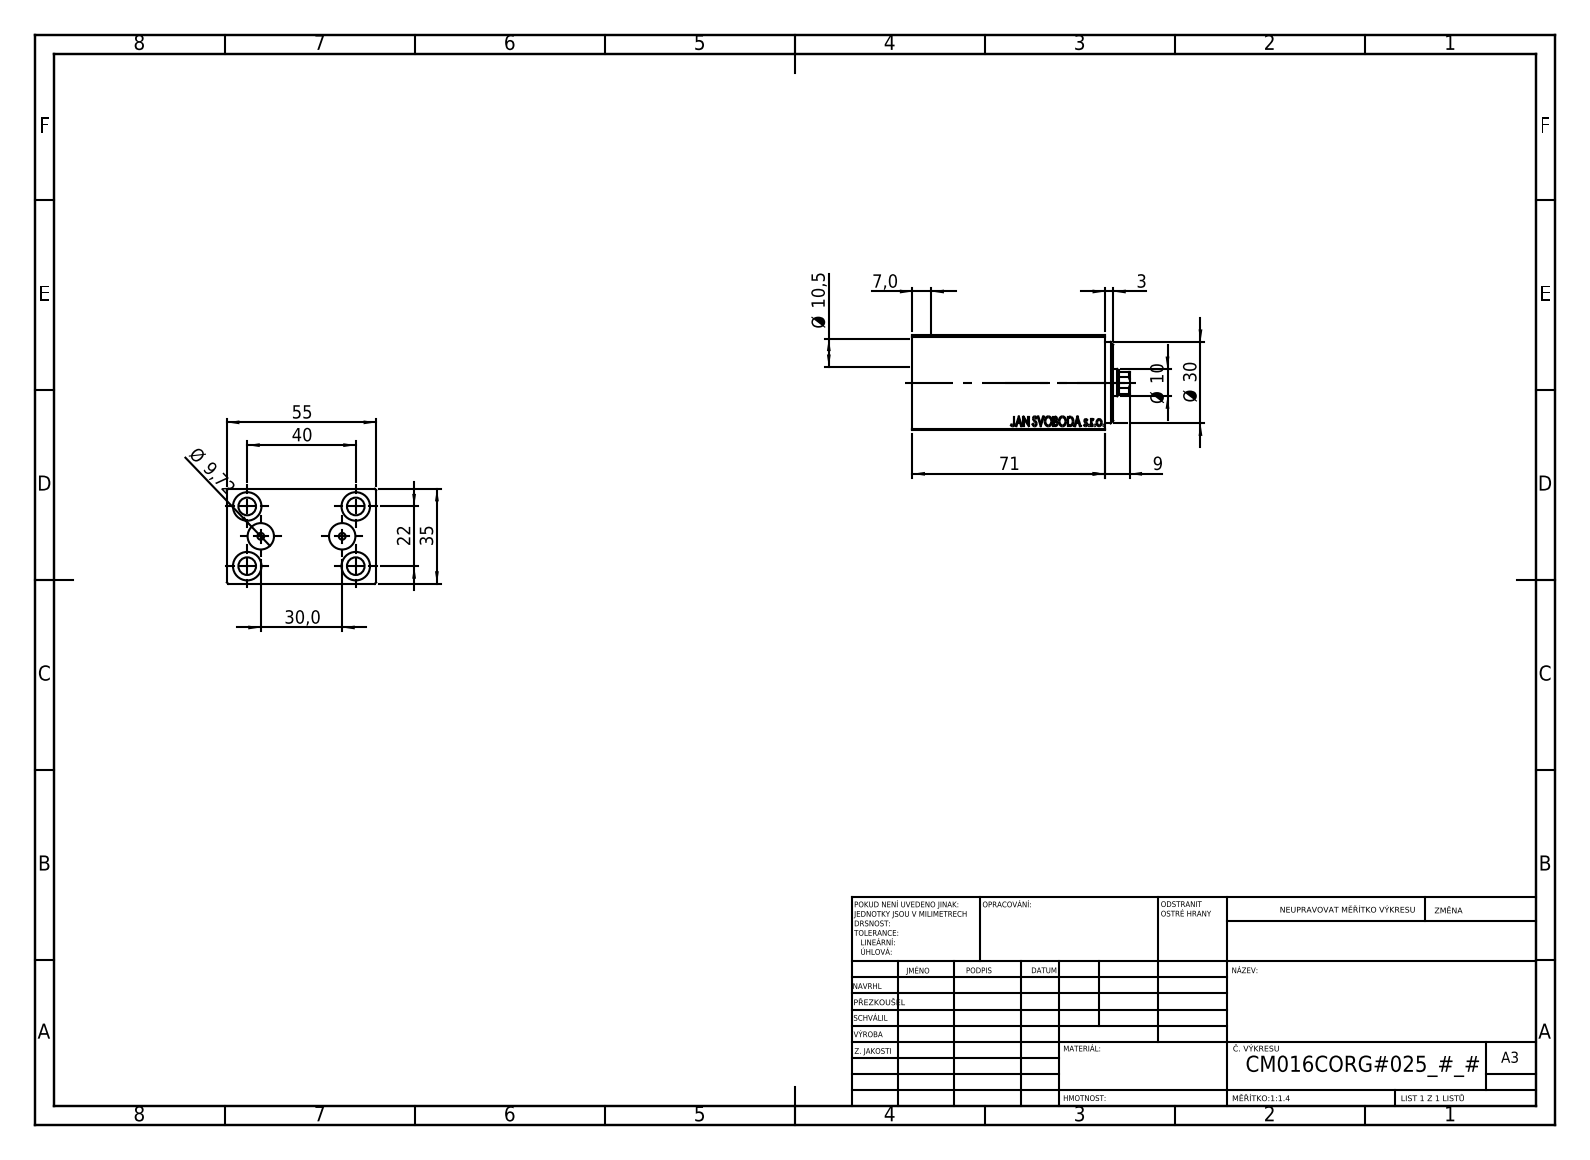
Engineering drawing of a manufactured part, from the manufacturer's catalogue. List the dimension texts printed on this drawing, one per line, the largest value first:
71
55
40
35
Ø 30
30,0
22
Ø 10,5
Ø 10
Ø 9,72
9
7,0
3
